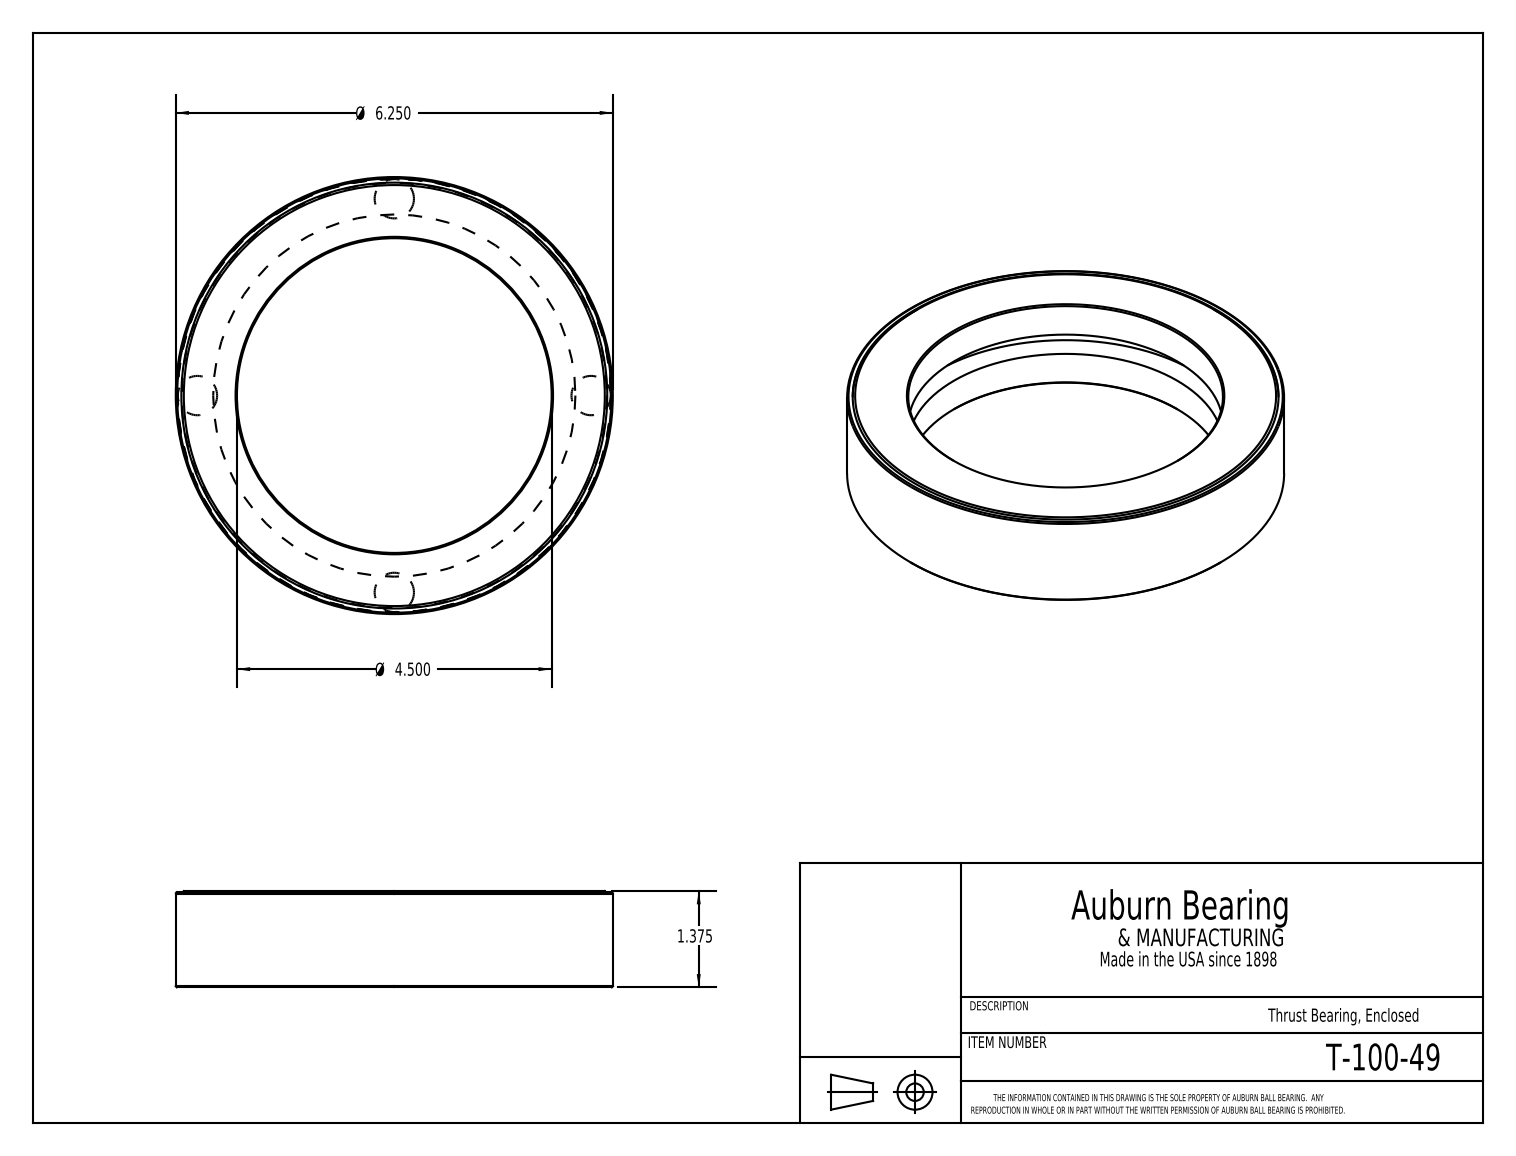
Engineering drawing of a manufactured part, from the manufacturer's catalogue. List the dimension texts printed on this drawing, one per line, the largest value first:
Ø 6.250
Ø 4.500
1.375
